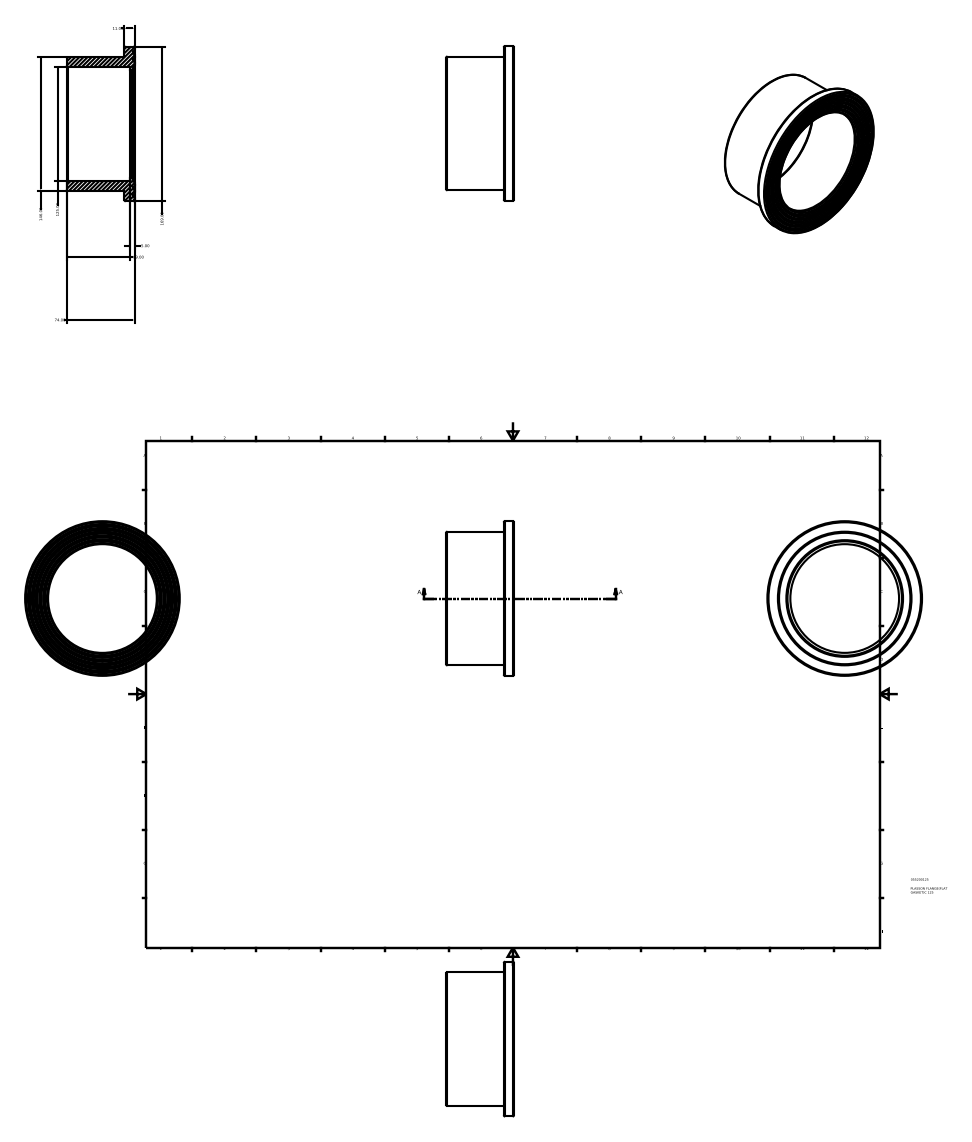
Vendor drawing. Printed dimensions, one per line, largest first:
169.00
146.00
125.00
74.00
69.00
11.00
5.00
